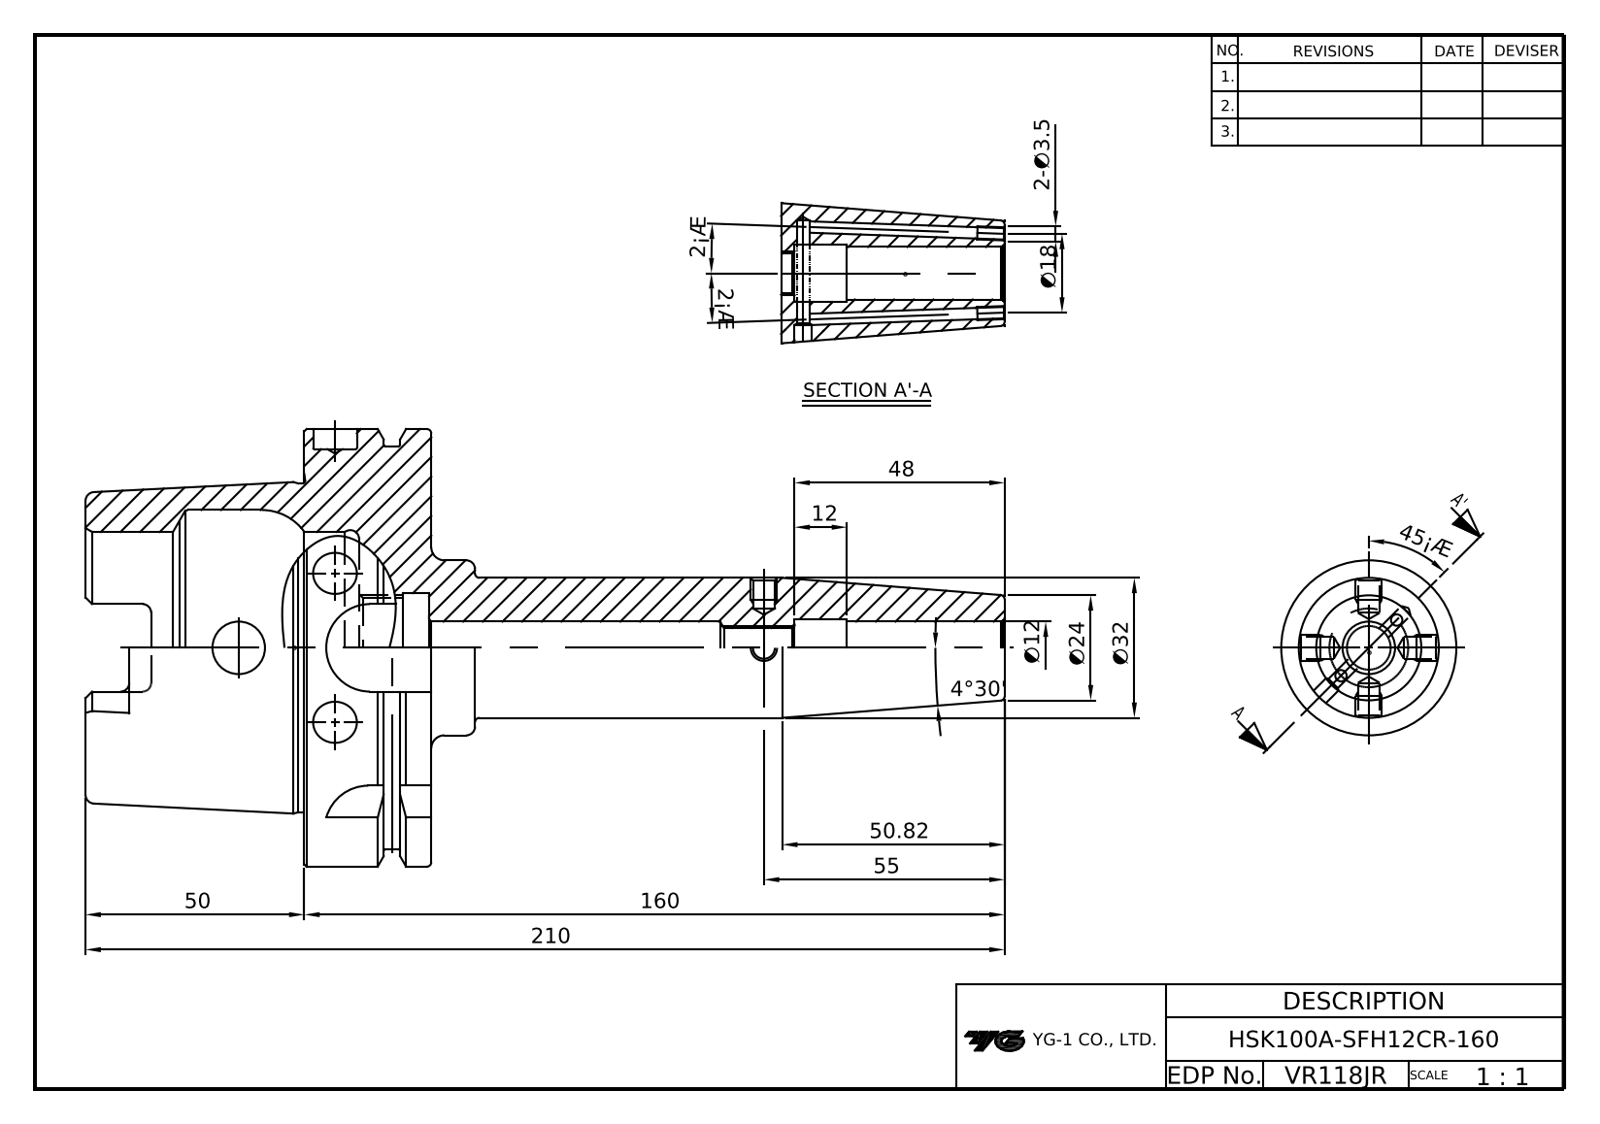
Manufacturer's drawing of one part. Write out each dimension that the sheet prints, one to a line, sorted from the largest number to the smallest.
358.00
358.00
210.00
160.00
55.00
50.82
50.00
48.00
45.00
32.00
24.00
18.00
12.00
12.00
4°30'
3.50
